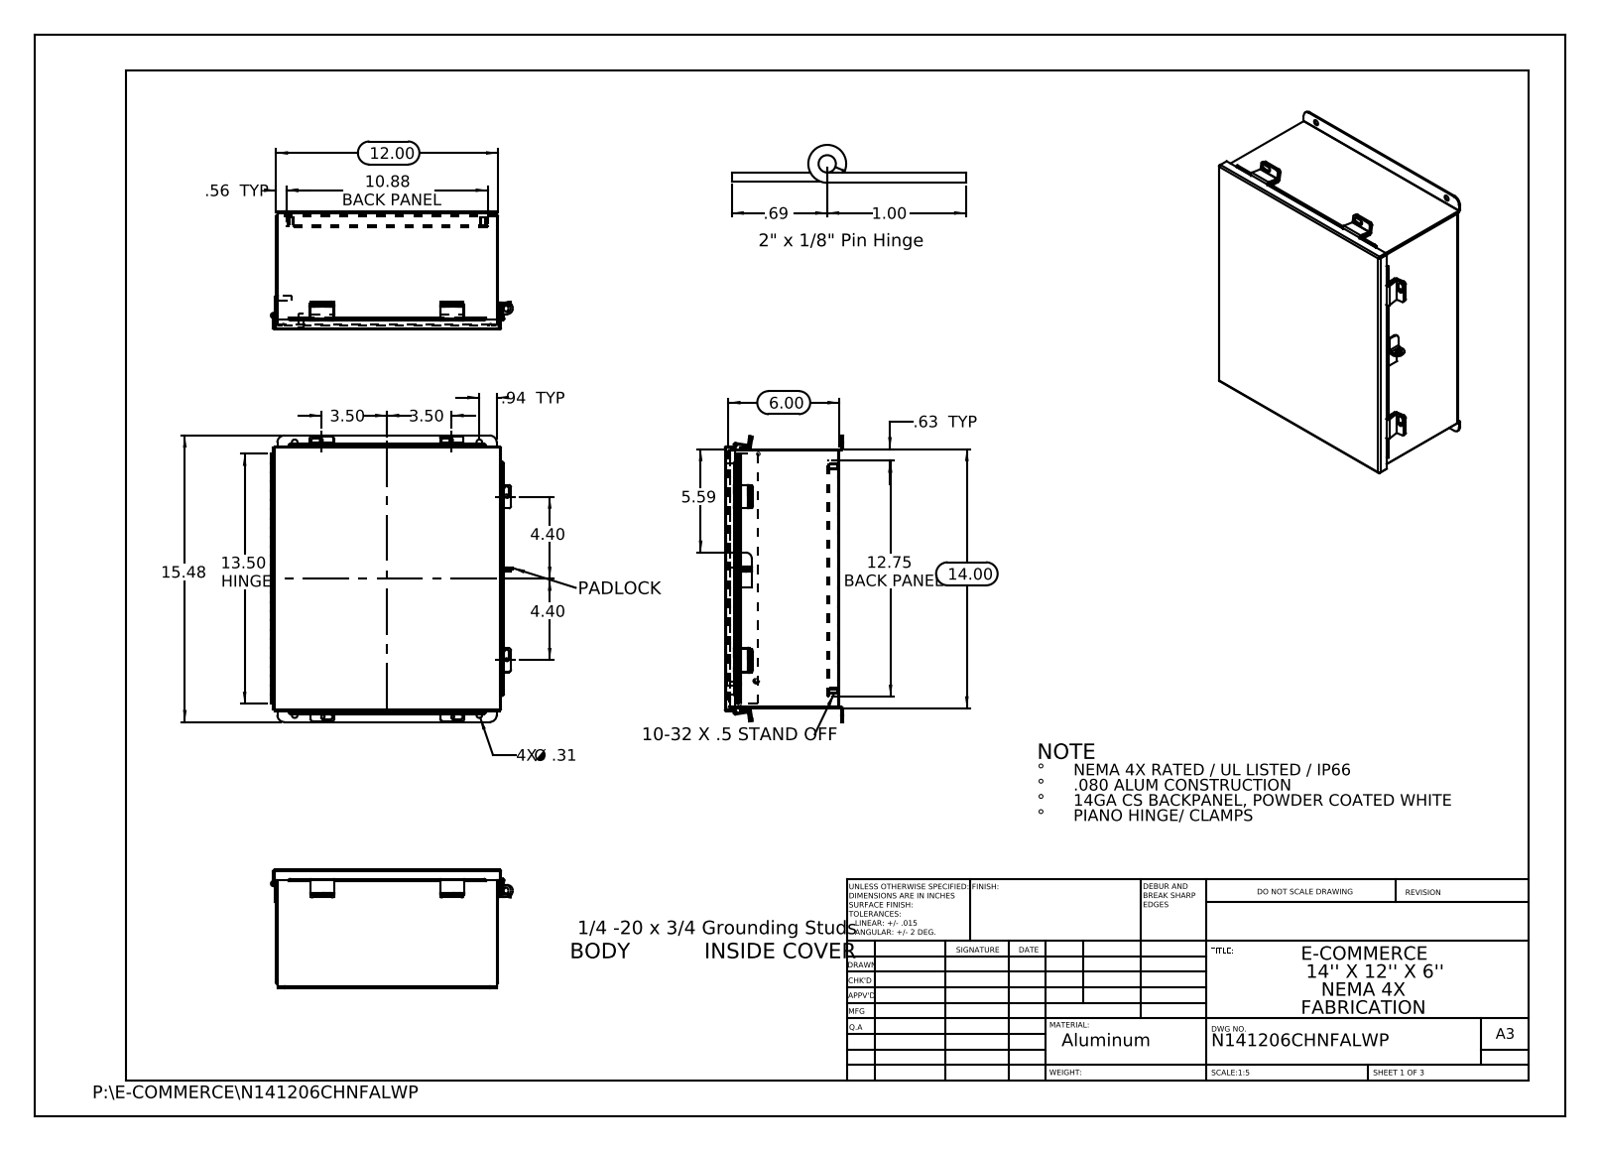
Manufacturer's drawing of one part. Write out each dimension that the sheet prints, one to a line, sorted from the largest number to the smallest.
15.48
14.00
13.50 HINGE
12.75 BACK PANEL
12.00
10.88 BACK PANEL
6.00
5.59
4.40
4.40
3.50
3.50
1.00
.94 TYP
.69
.63 TYP
.56 TYP
4X Ø .31
